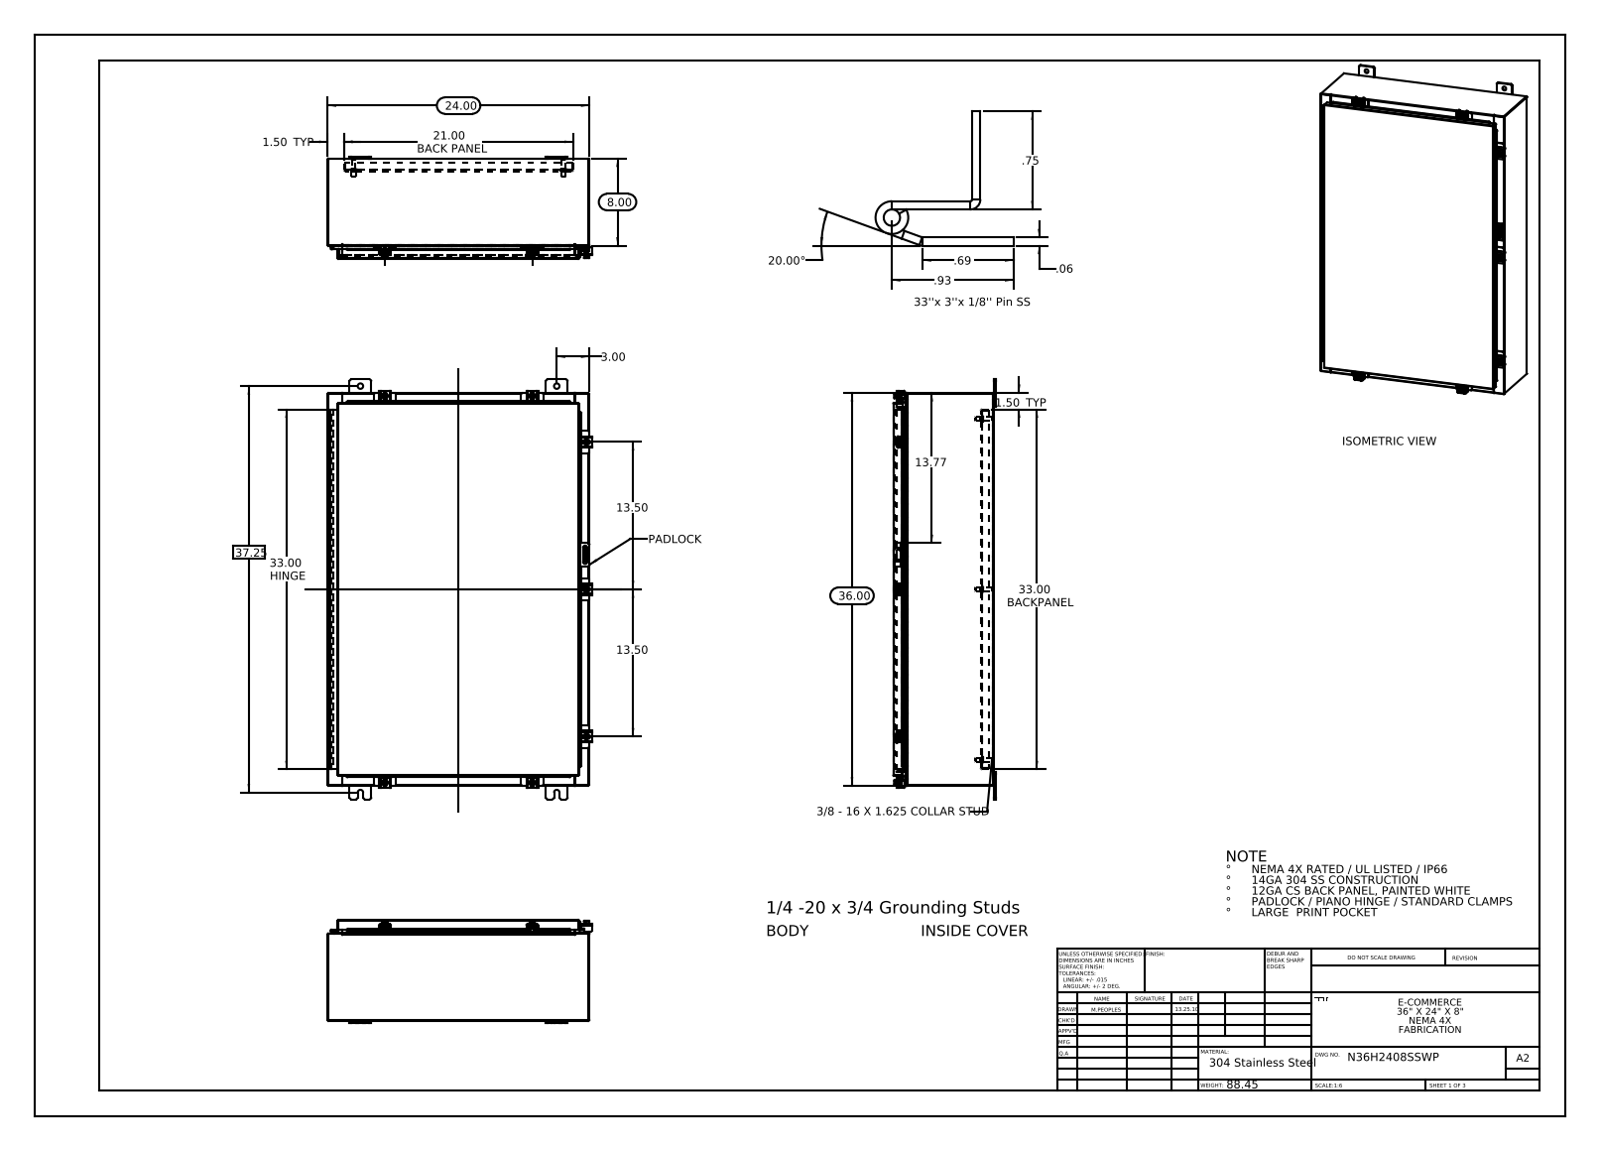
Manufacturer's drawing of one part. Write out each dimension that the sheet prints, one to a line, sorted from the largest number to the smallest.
37.25
36.00
33.00 HINGE
33.00 BACKPANEL
24.00
21.00 BACK PANEL
20.00°
13.77
13.50
13.50
8.00
3.00
1.50 TYP
1.50 TYP
.93
.75
.69
.06
